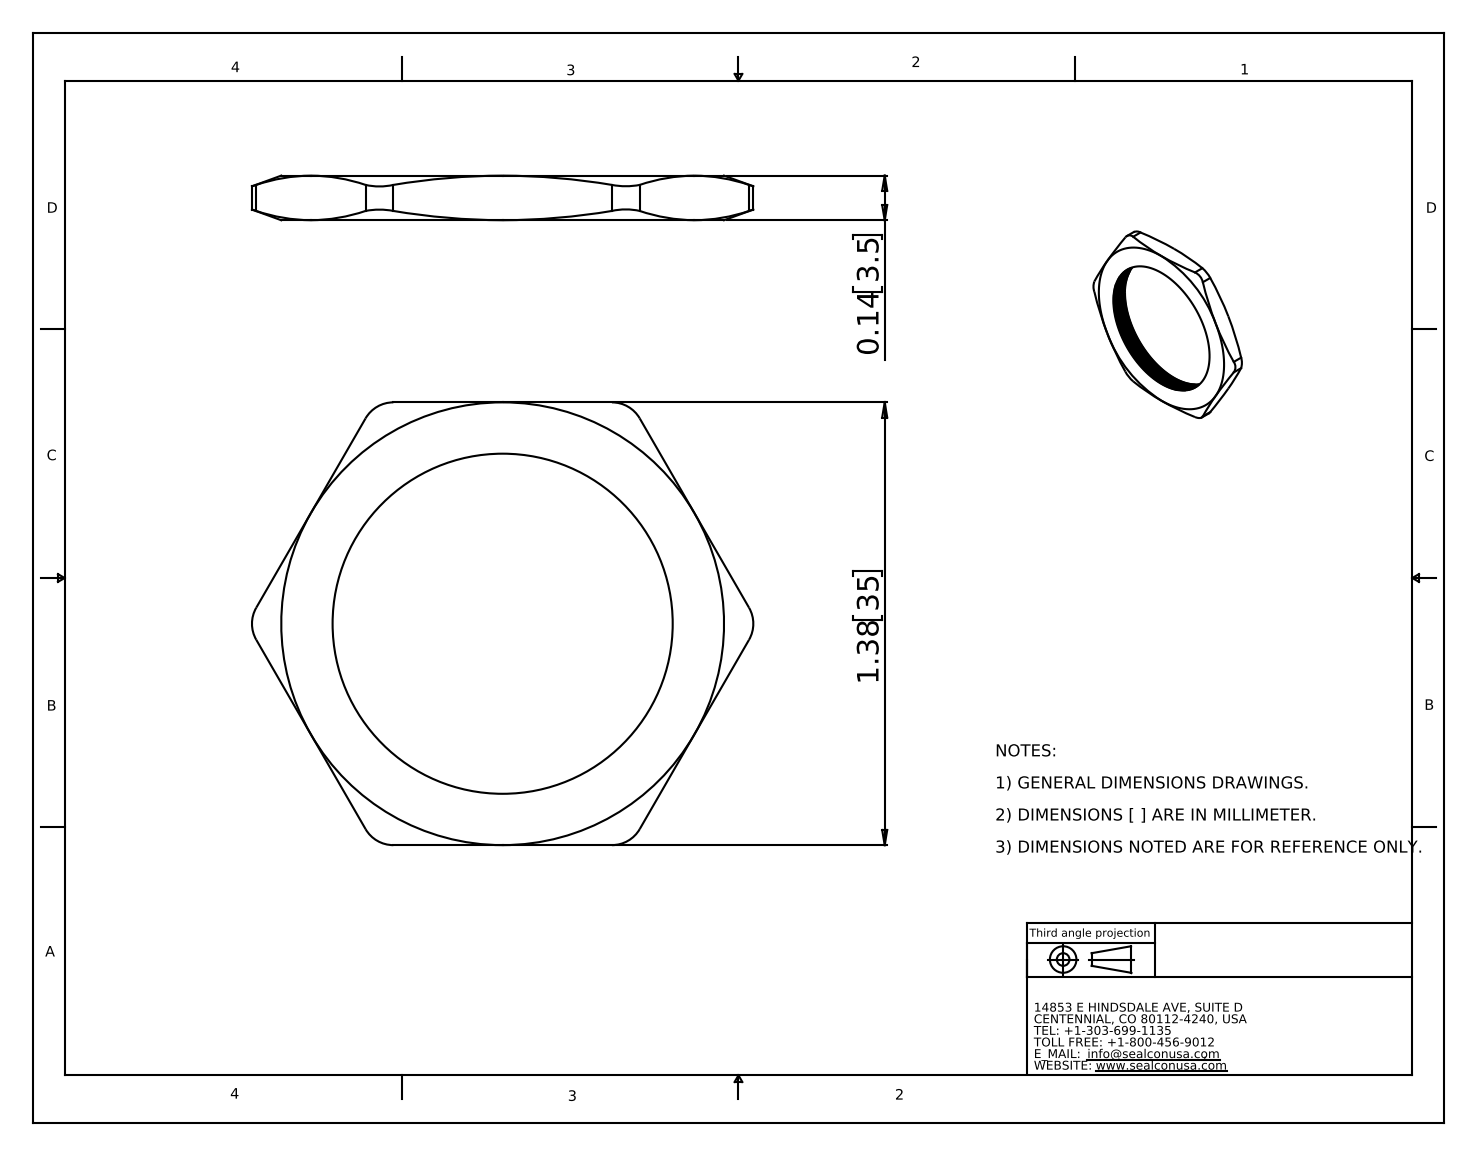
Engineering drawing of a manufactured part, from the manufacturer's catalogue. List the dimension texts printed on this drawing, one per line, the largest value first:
1.38 35
0.14 3.5
